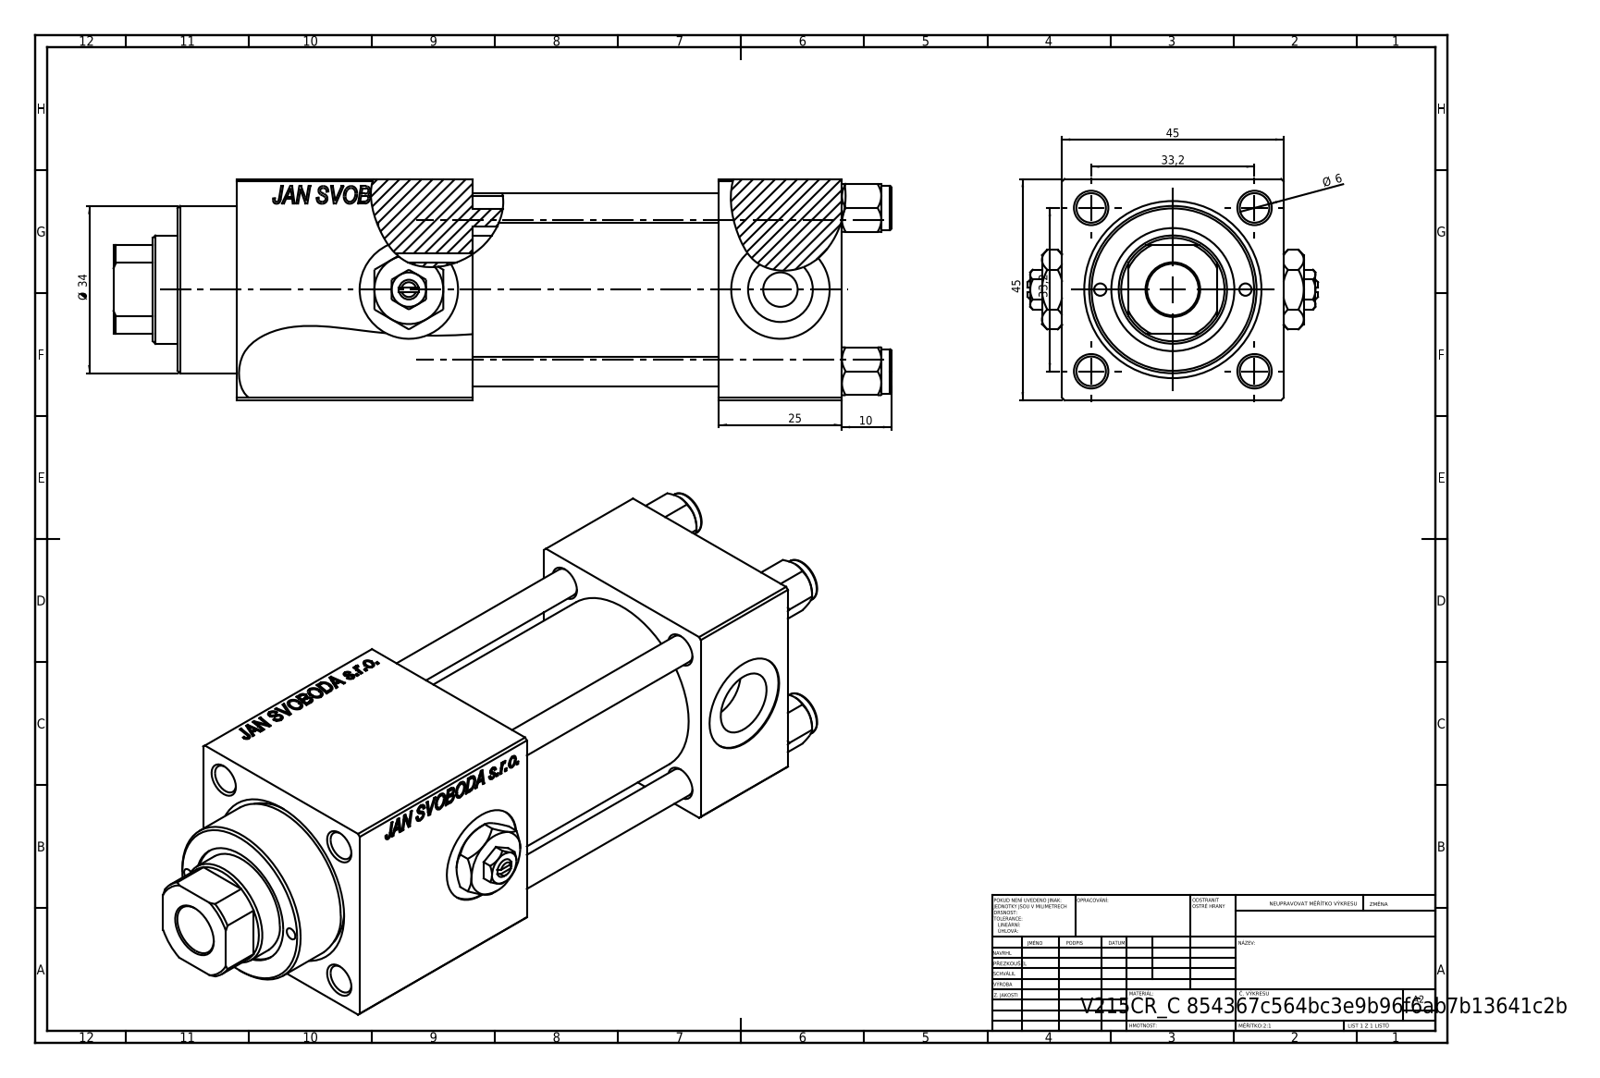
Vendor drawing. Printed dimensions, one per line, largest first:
45
45
Ø 34
33,2
33,2
25
10
Ø 6
